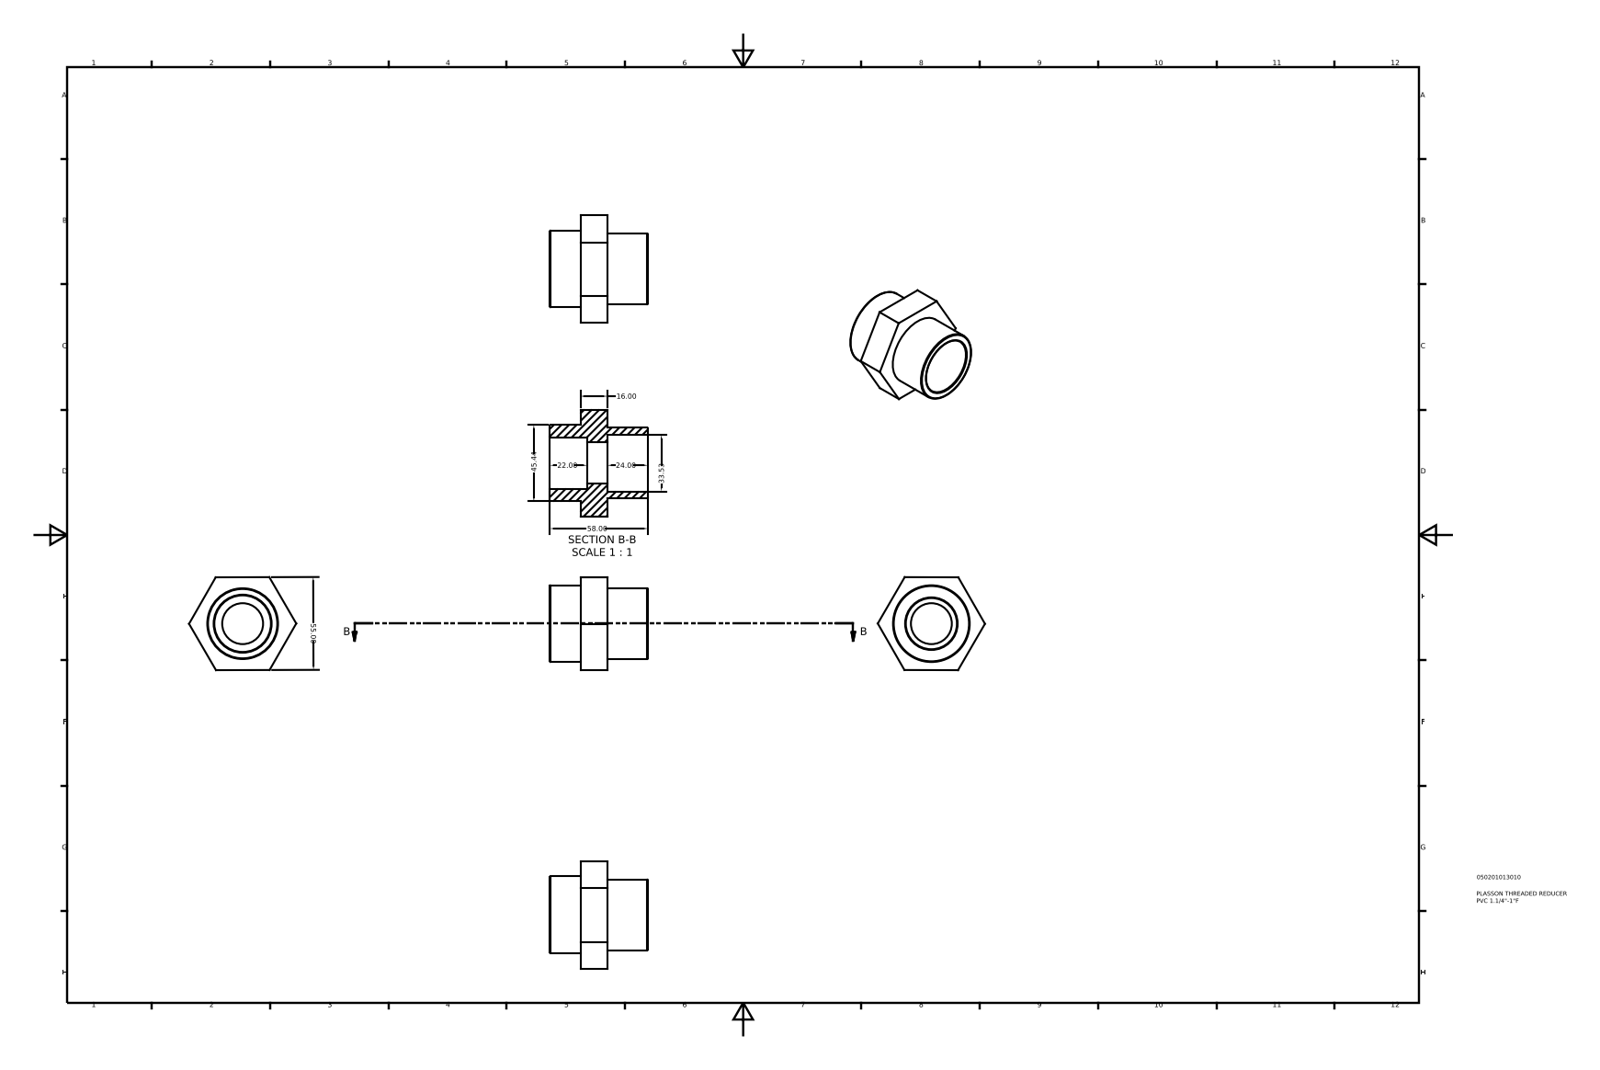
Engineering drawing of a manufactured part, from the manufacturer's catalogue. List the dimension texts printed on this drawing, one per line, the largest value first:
58.00
55.00
45.44
33.53
24.00
22.00
16.00
